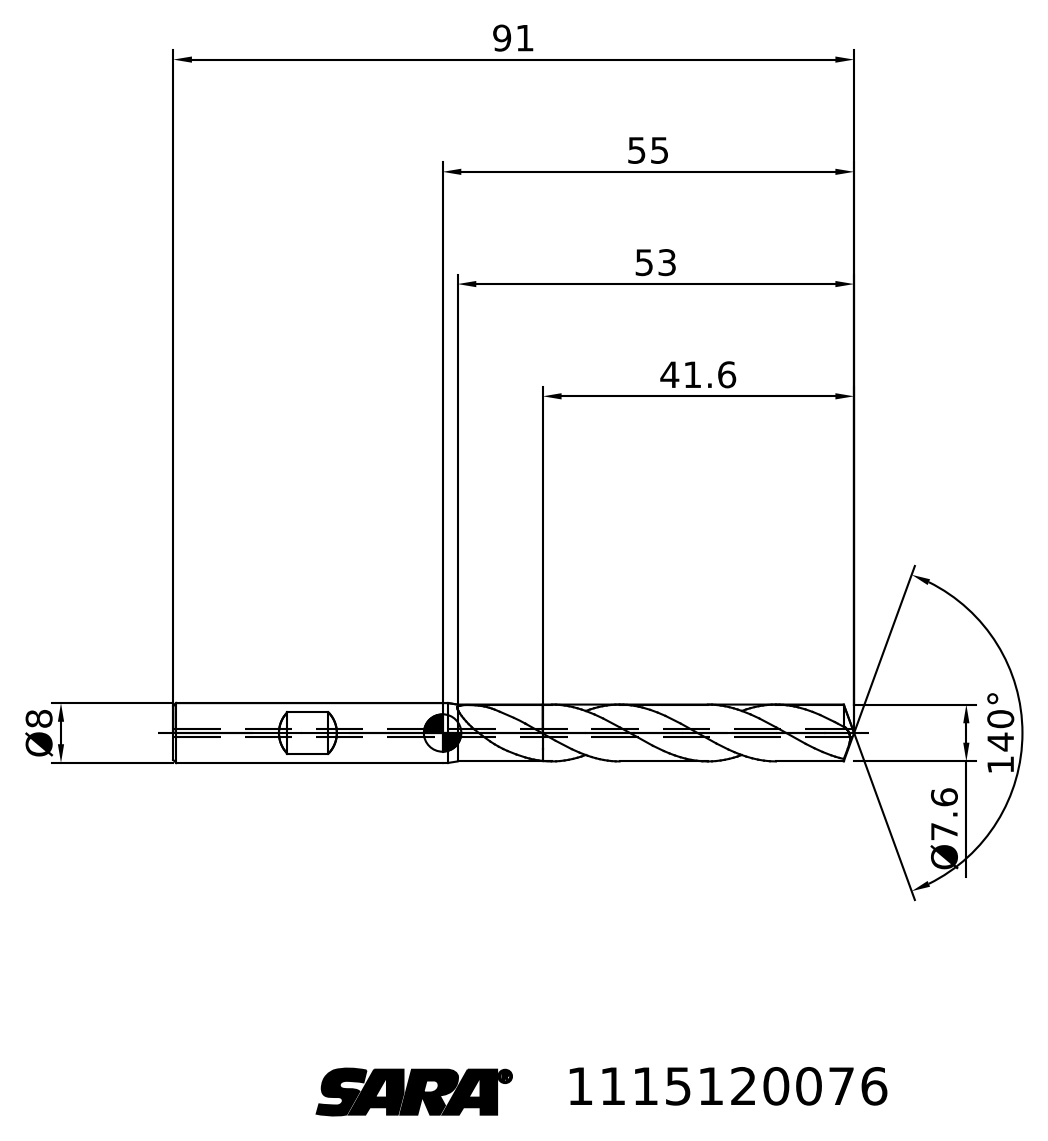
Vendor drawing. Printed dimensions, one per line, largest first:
140°
91
55
53
41.6
Ø8
Ø7.6
